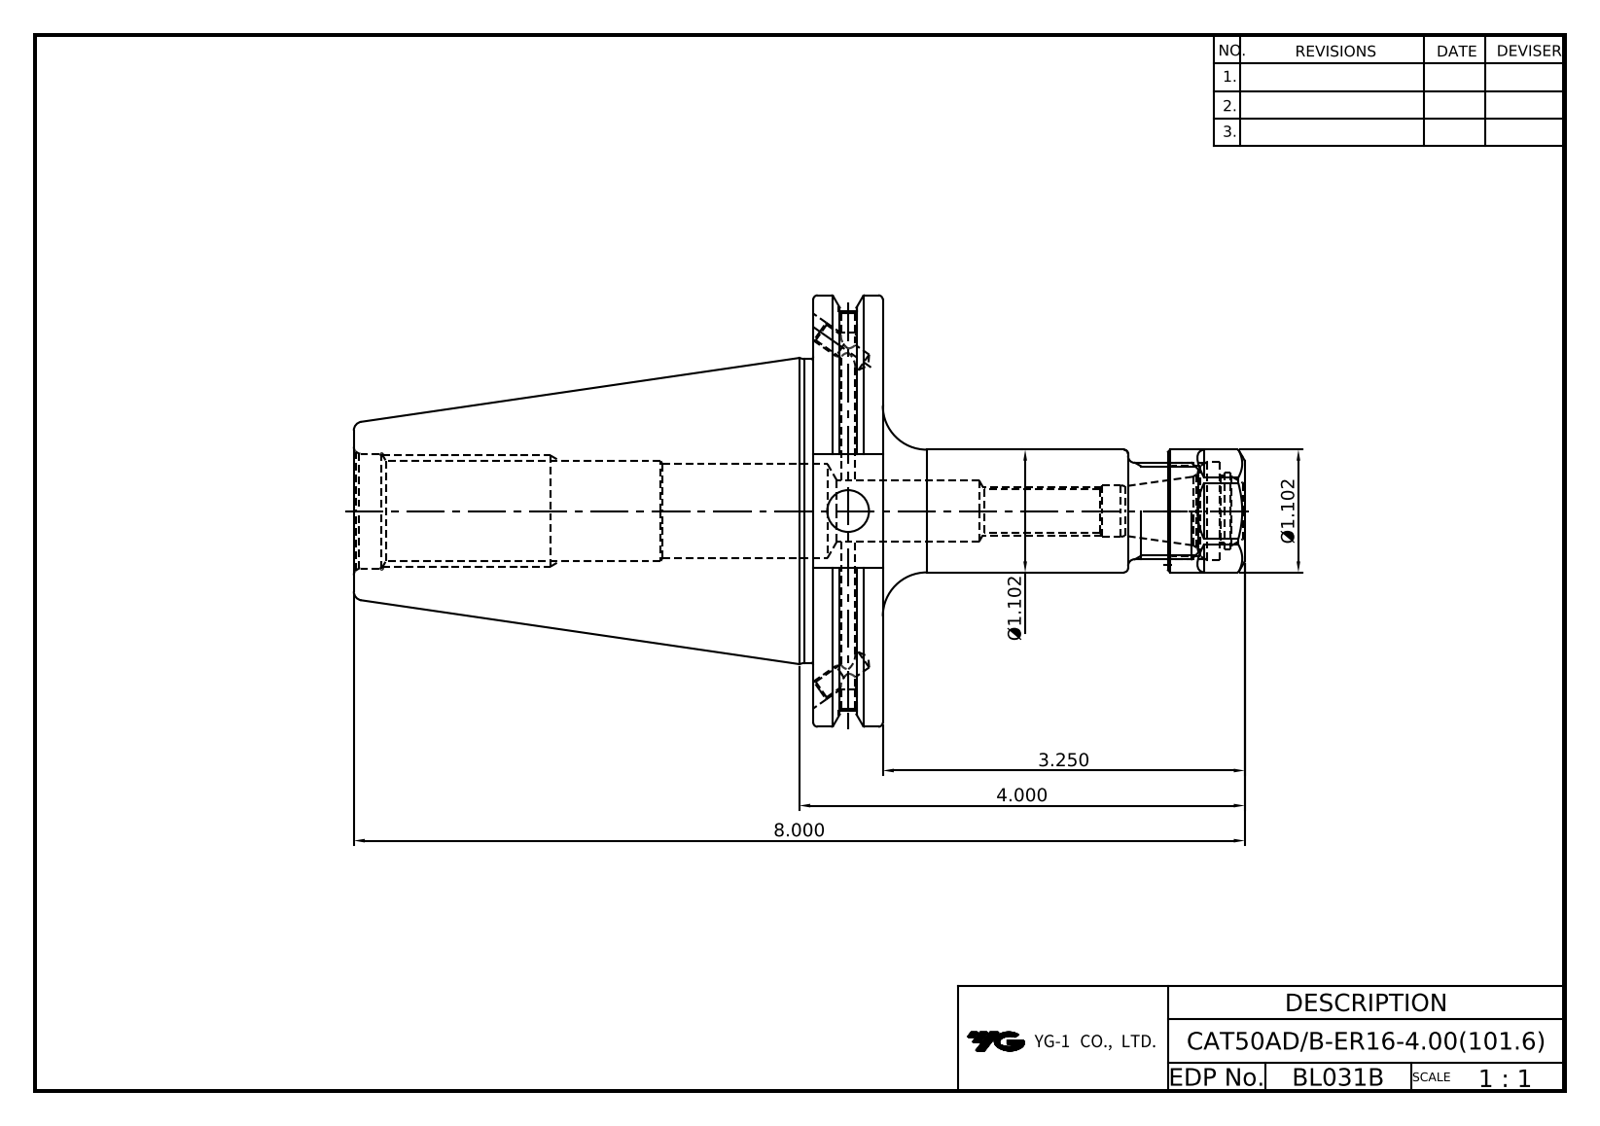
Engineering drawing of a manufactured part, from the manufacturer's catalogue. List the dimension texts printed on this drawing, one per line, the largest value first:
8.000
4.000
3.250
Ø1.102
Ø1.102
